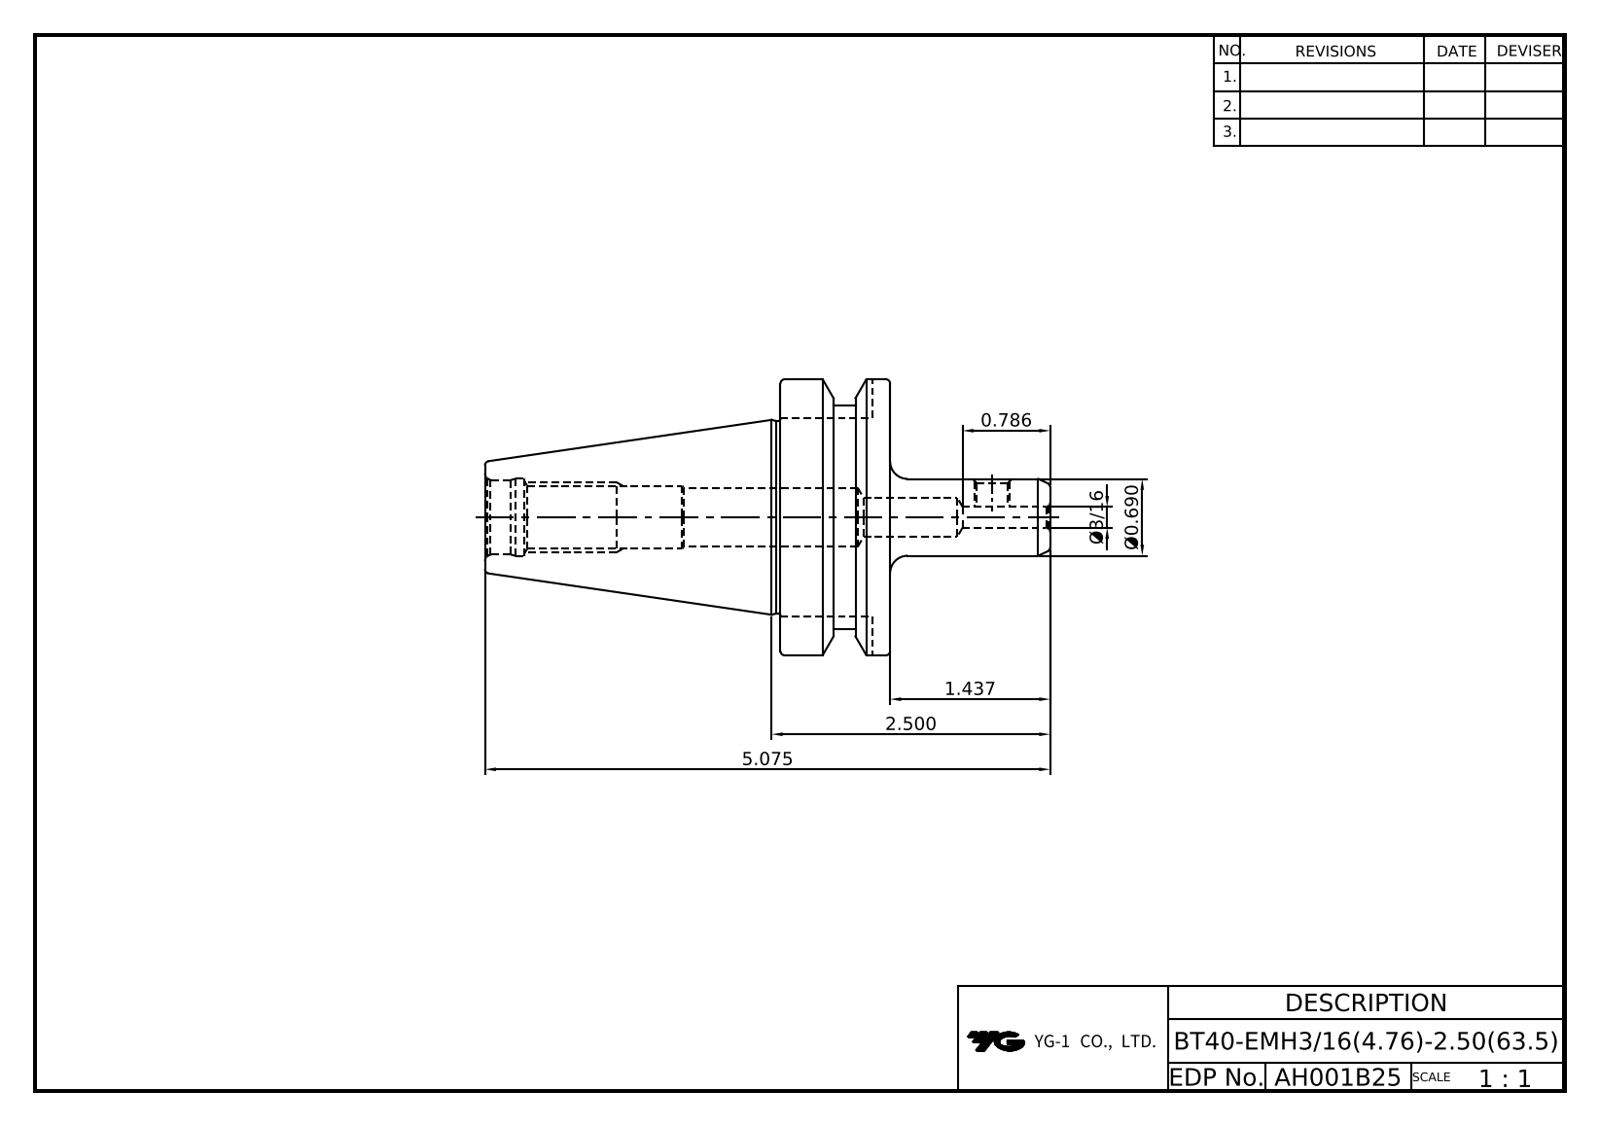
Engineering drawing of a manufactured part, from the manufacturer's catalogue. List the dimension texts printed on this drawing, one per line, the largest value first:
5.075
2.500
1.437
0.786
Ø0.690
Ø3/16
